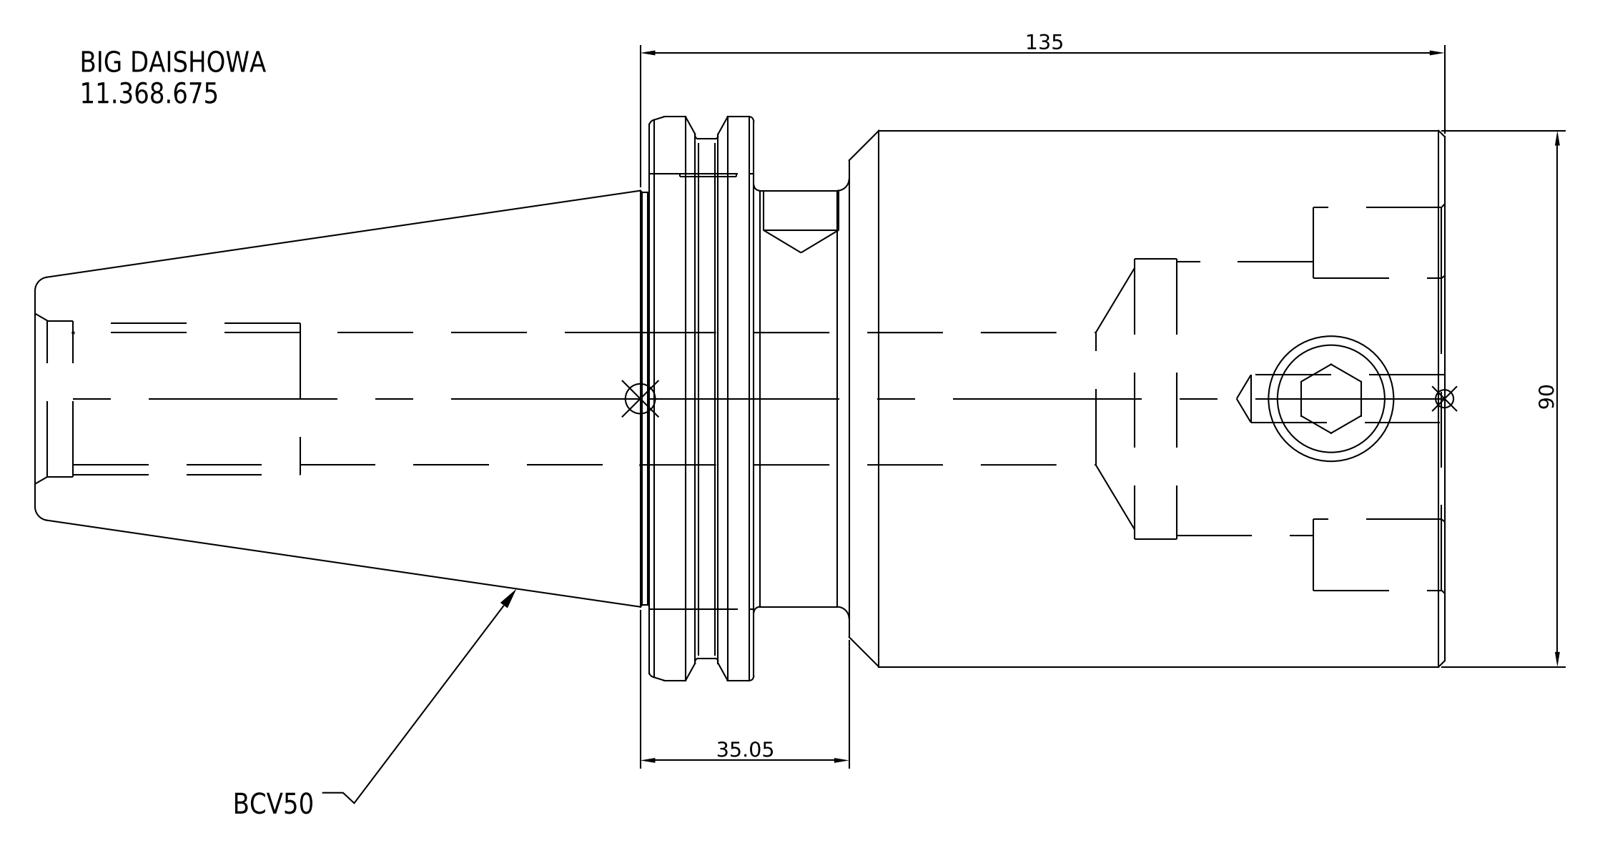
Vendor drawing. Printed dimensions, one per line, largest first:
135
90
35.05
